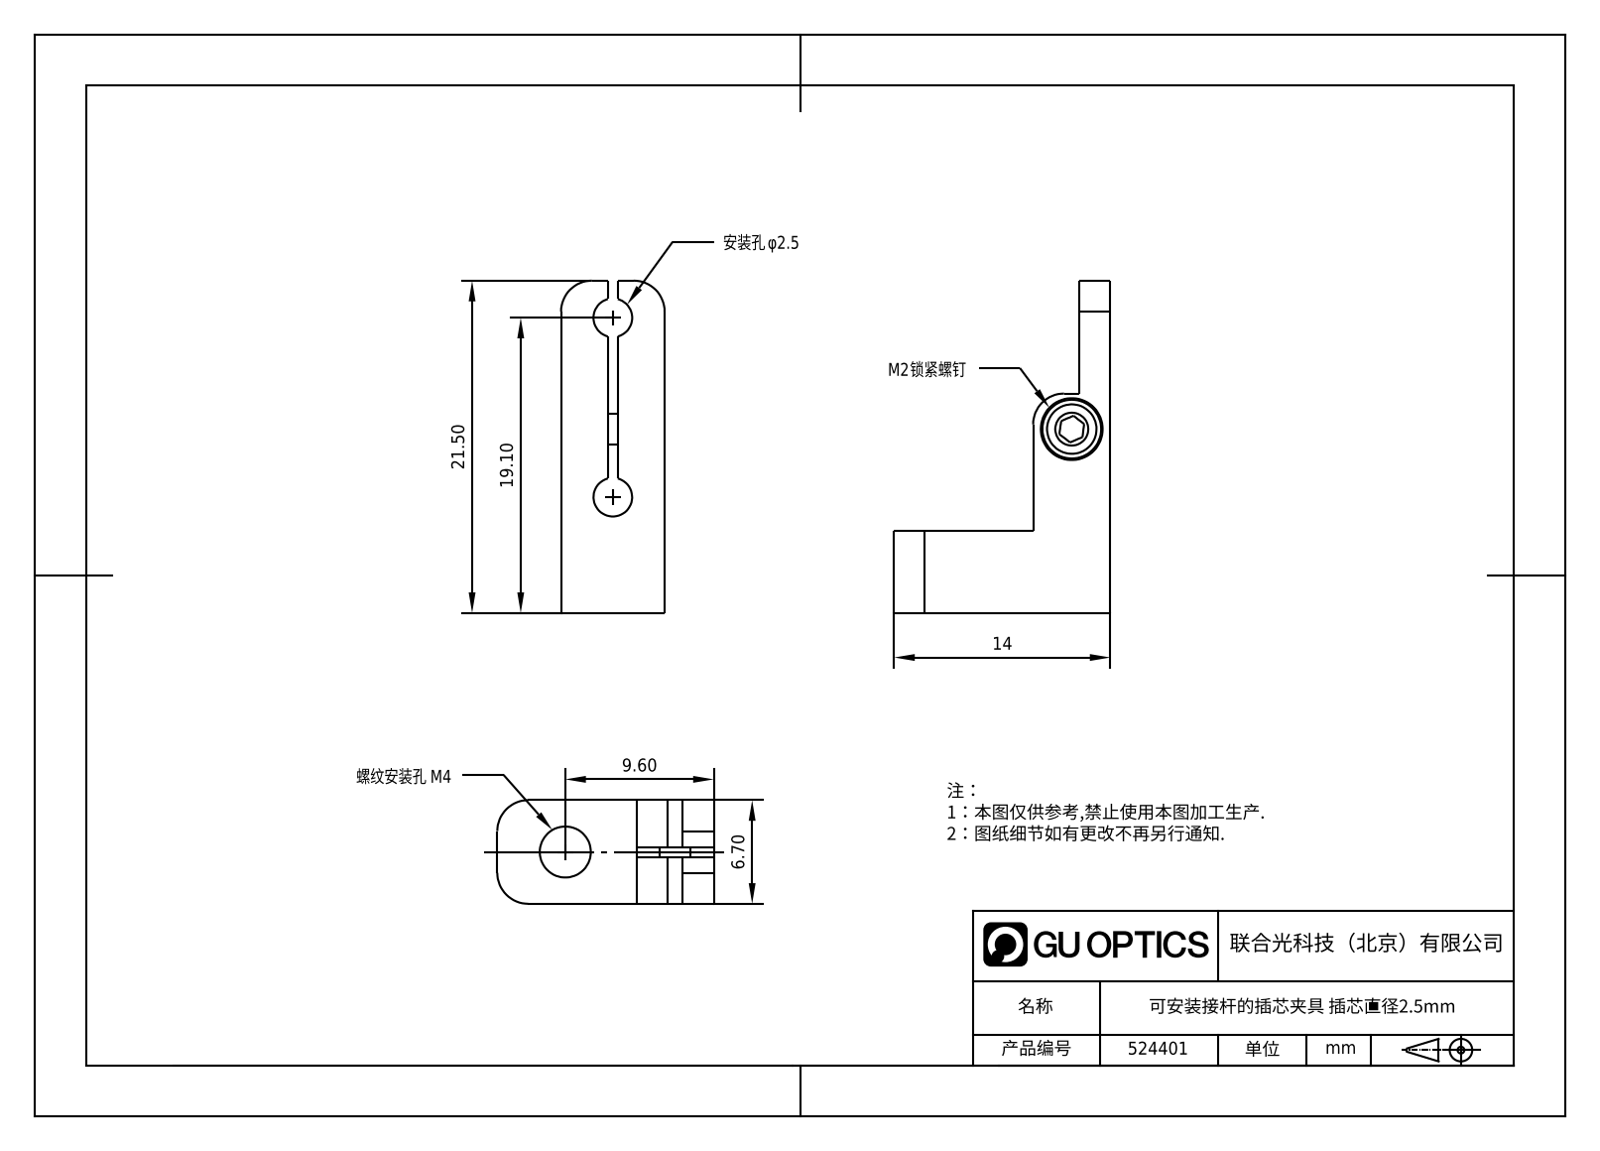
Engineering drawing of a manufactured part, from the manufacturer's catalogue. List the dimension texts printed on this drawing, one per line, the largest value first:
21.50
19.10
14
9.60
6.70
